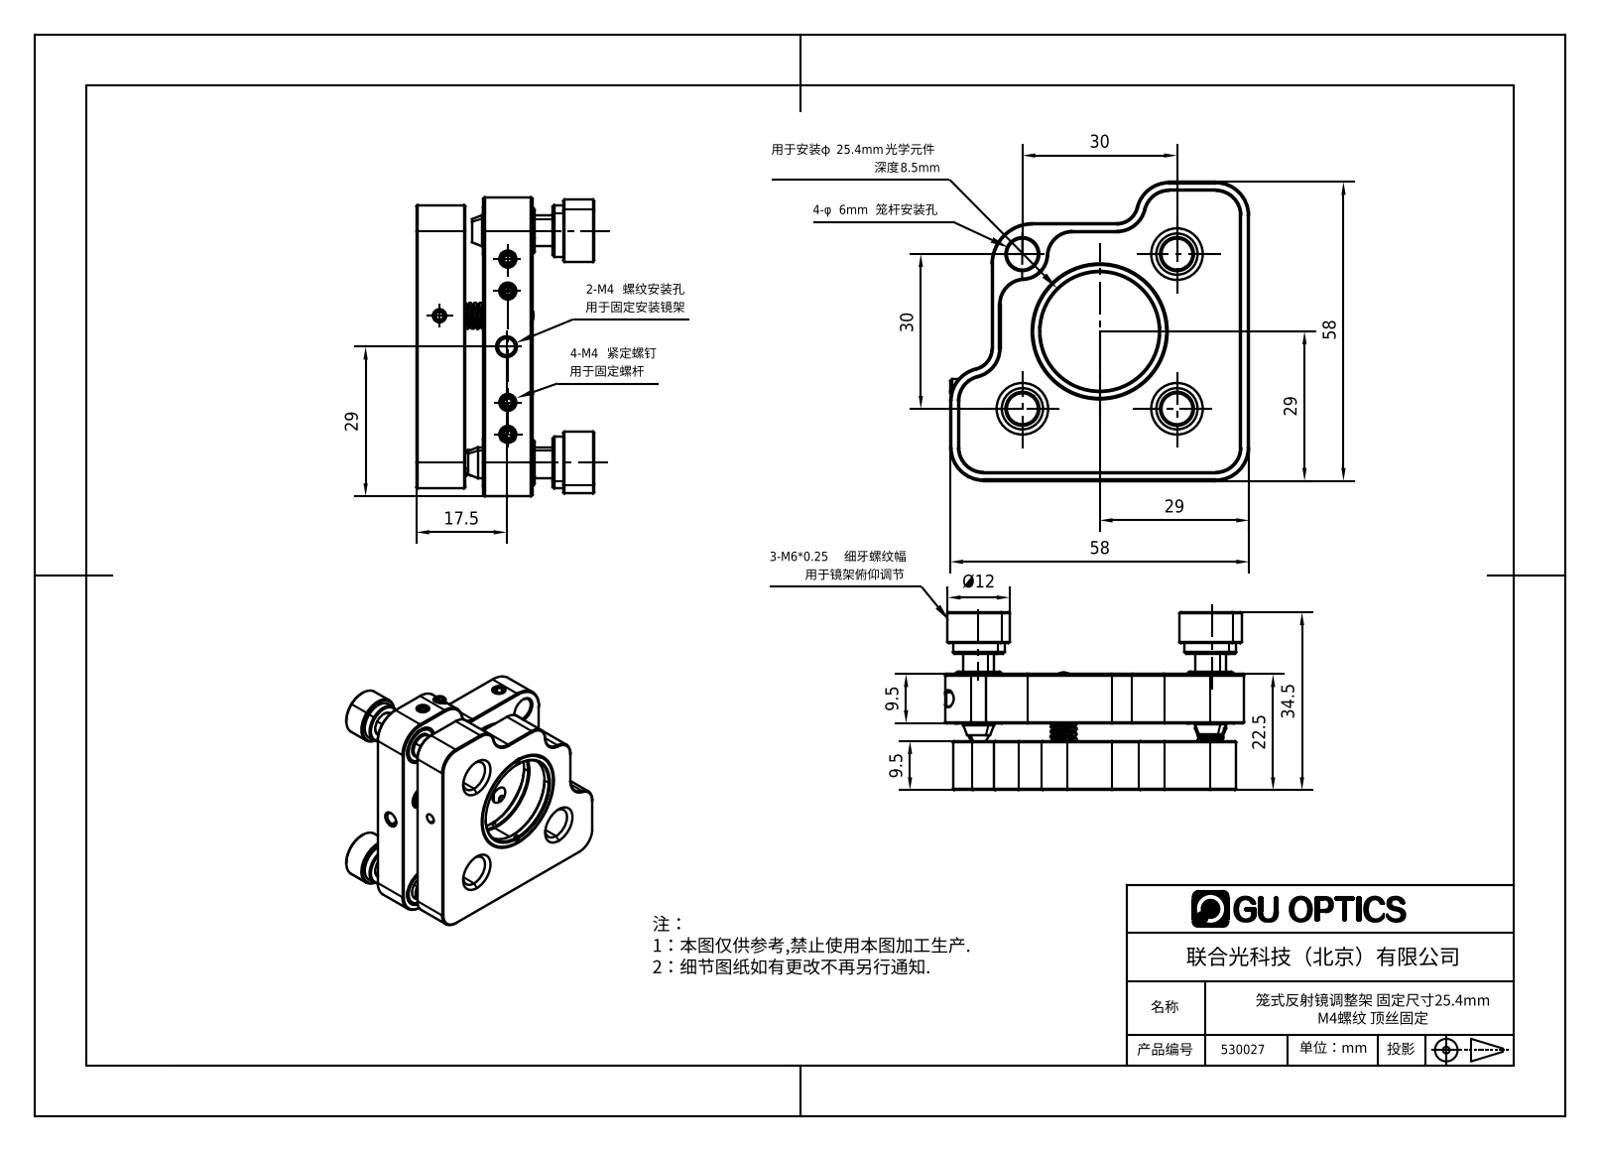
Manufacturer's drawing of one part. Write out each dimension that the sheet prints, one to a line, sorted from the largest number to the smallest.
58
58
34.5
30
30
29
29
29
22.5
17.5
Ø12
9.5
9.5
